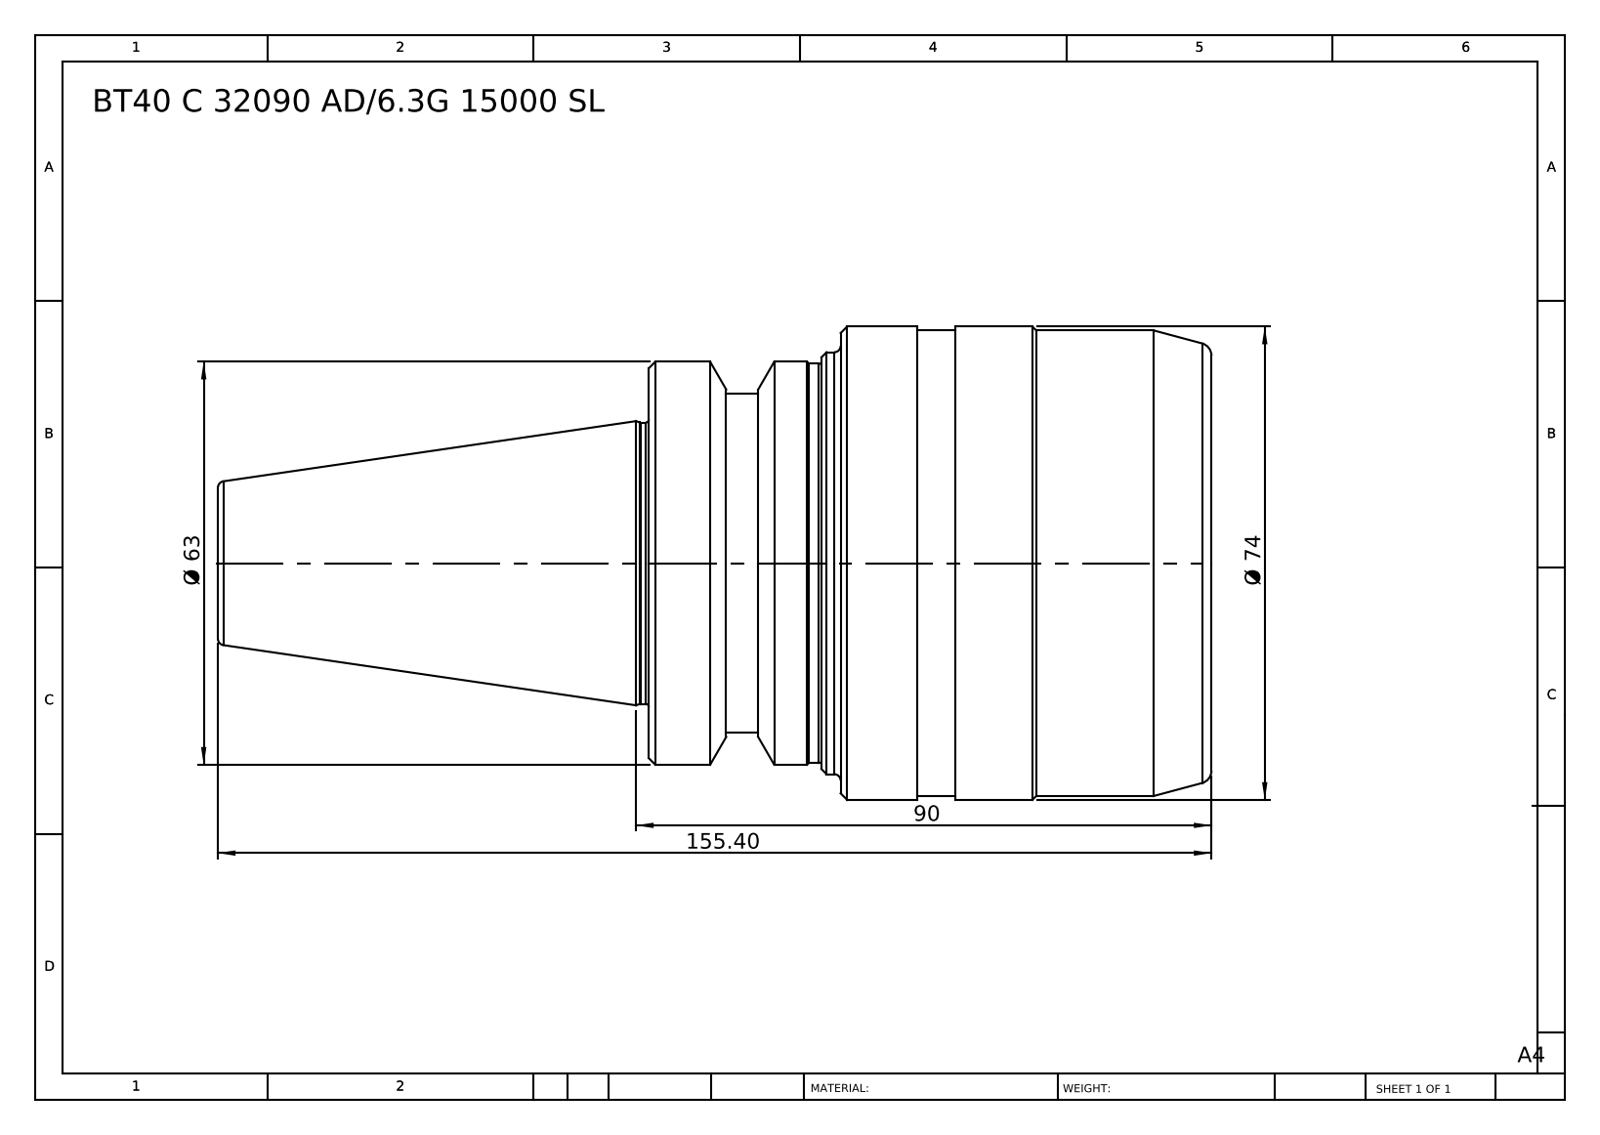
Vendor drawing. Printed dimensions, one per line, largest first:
155.40
90
Ø 74
Ø 63
